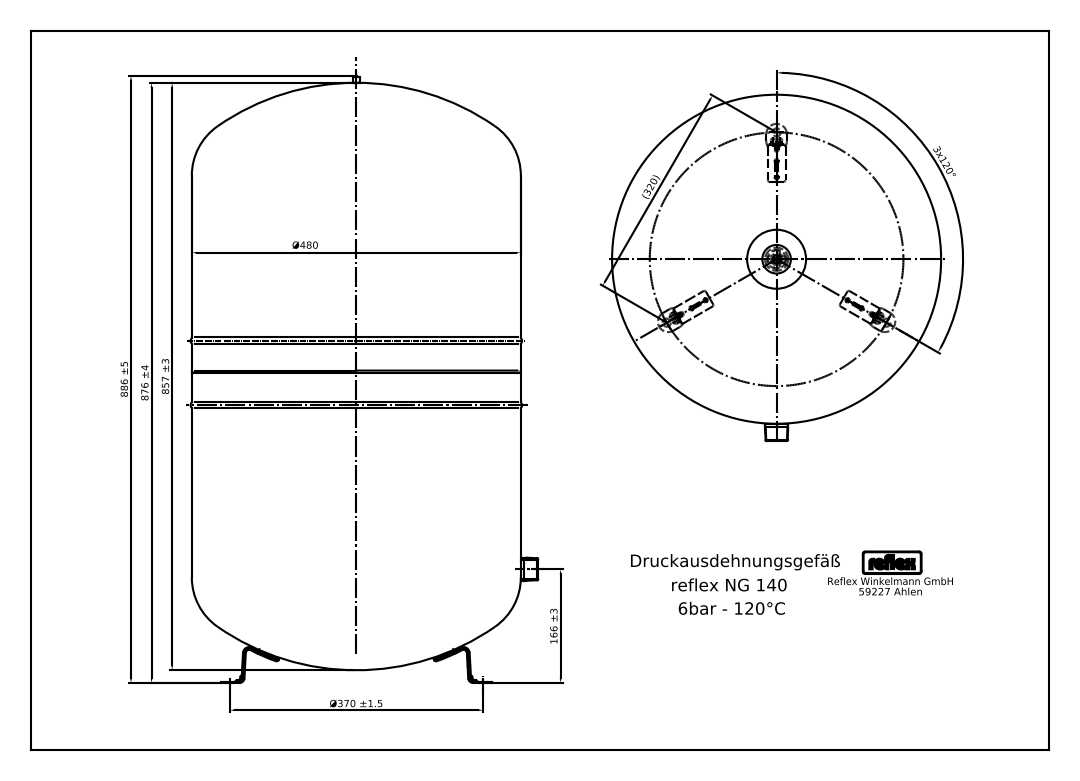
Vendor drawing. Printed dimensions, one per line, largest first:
886 ±5
876 ±4
857 ±3
Ø480
Ø370 ±1.5
(320)
166 ±3
3x120°
